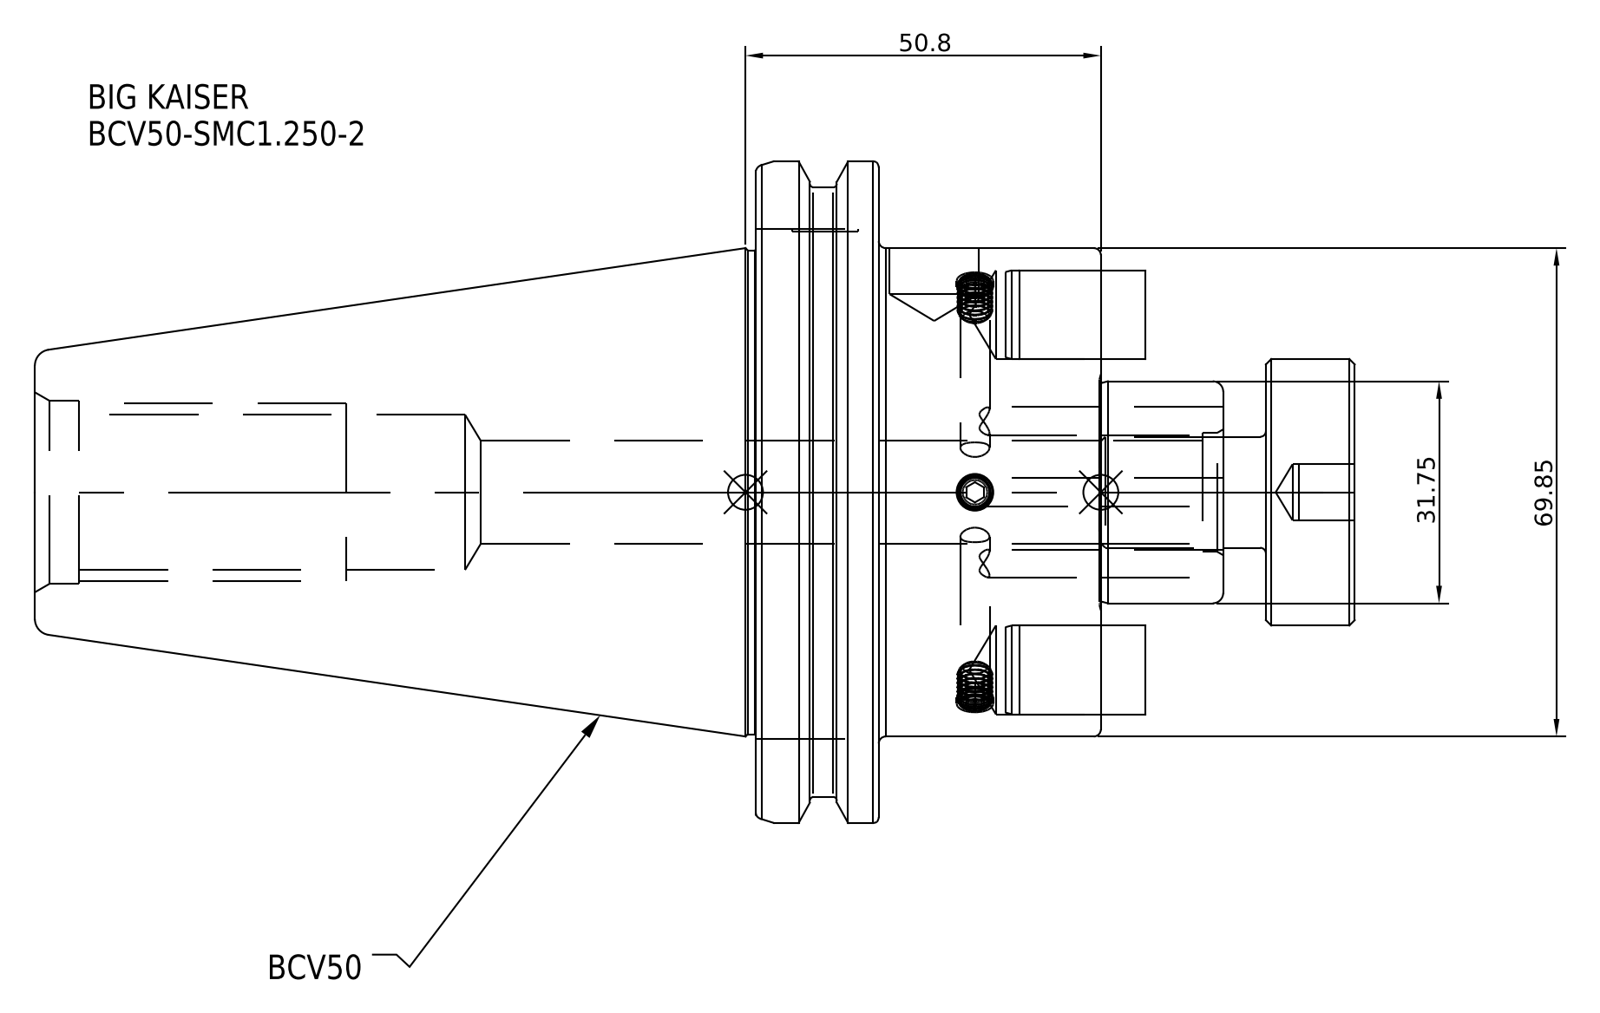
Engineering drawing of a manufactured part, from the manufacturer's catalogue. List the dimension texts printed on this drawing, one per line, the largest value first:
69.85
50.8
31.75
